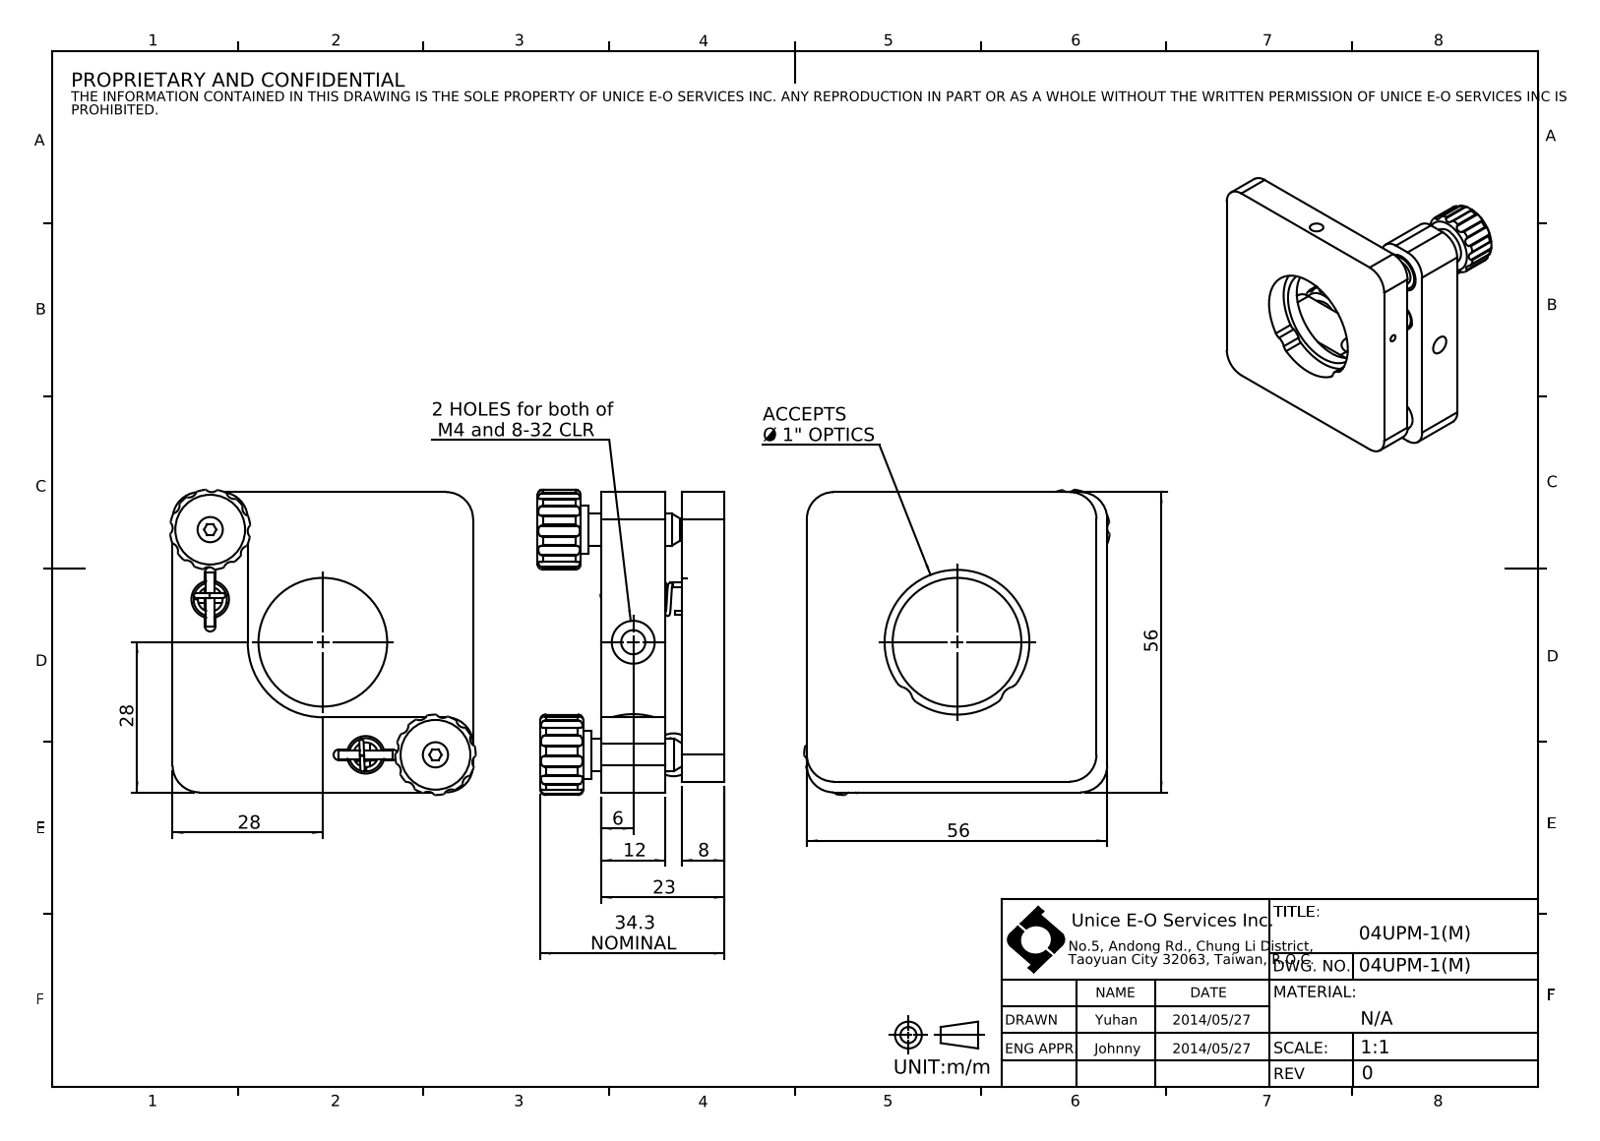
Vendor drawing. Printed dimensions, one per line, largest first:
56
56
34.3 NOMINAL
28
28
23
12
8
6
2 HOLES for both of M4 and 8-32 CLR
ACCEPTS Ø 1" OPTICS
